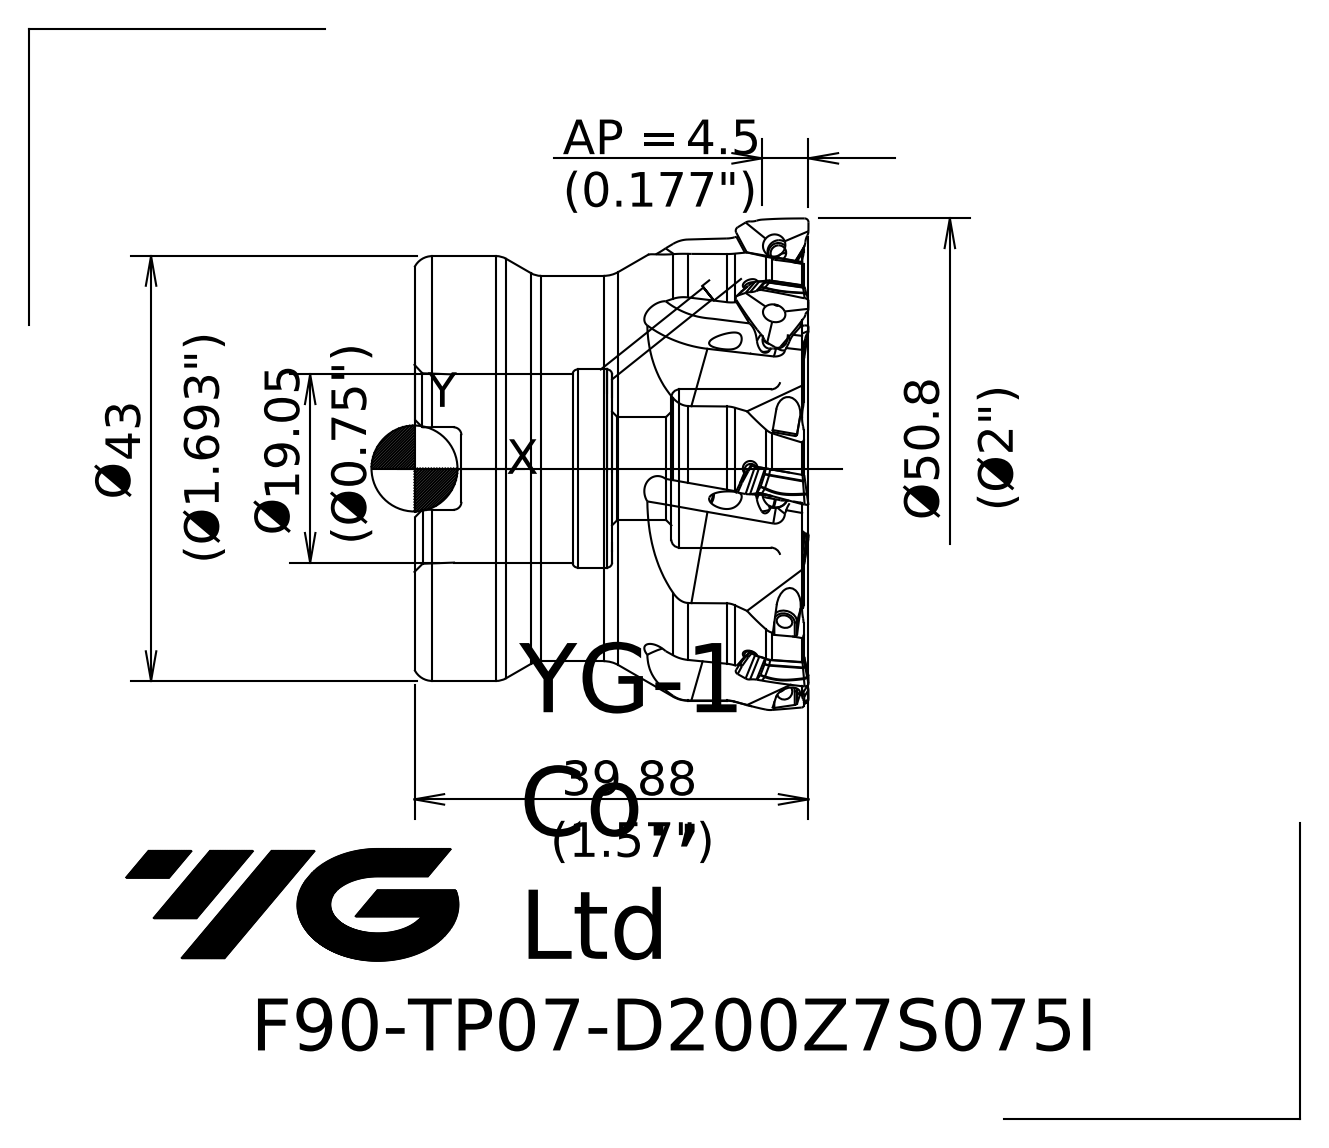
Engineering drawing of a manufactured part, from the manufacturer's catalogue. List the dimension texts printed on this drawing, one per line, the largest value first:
Ø50.8
39.88
Ø 19.05
4.5 AP =
